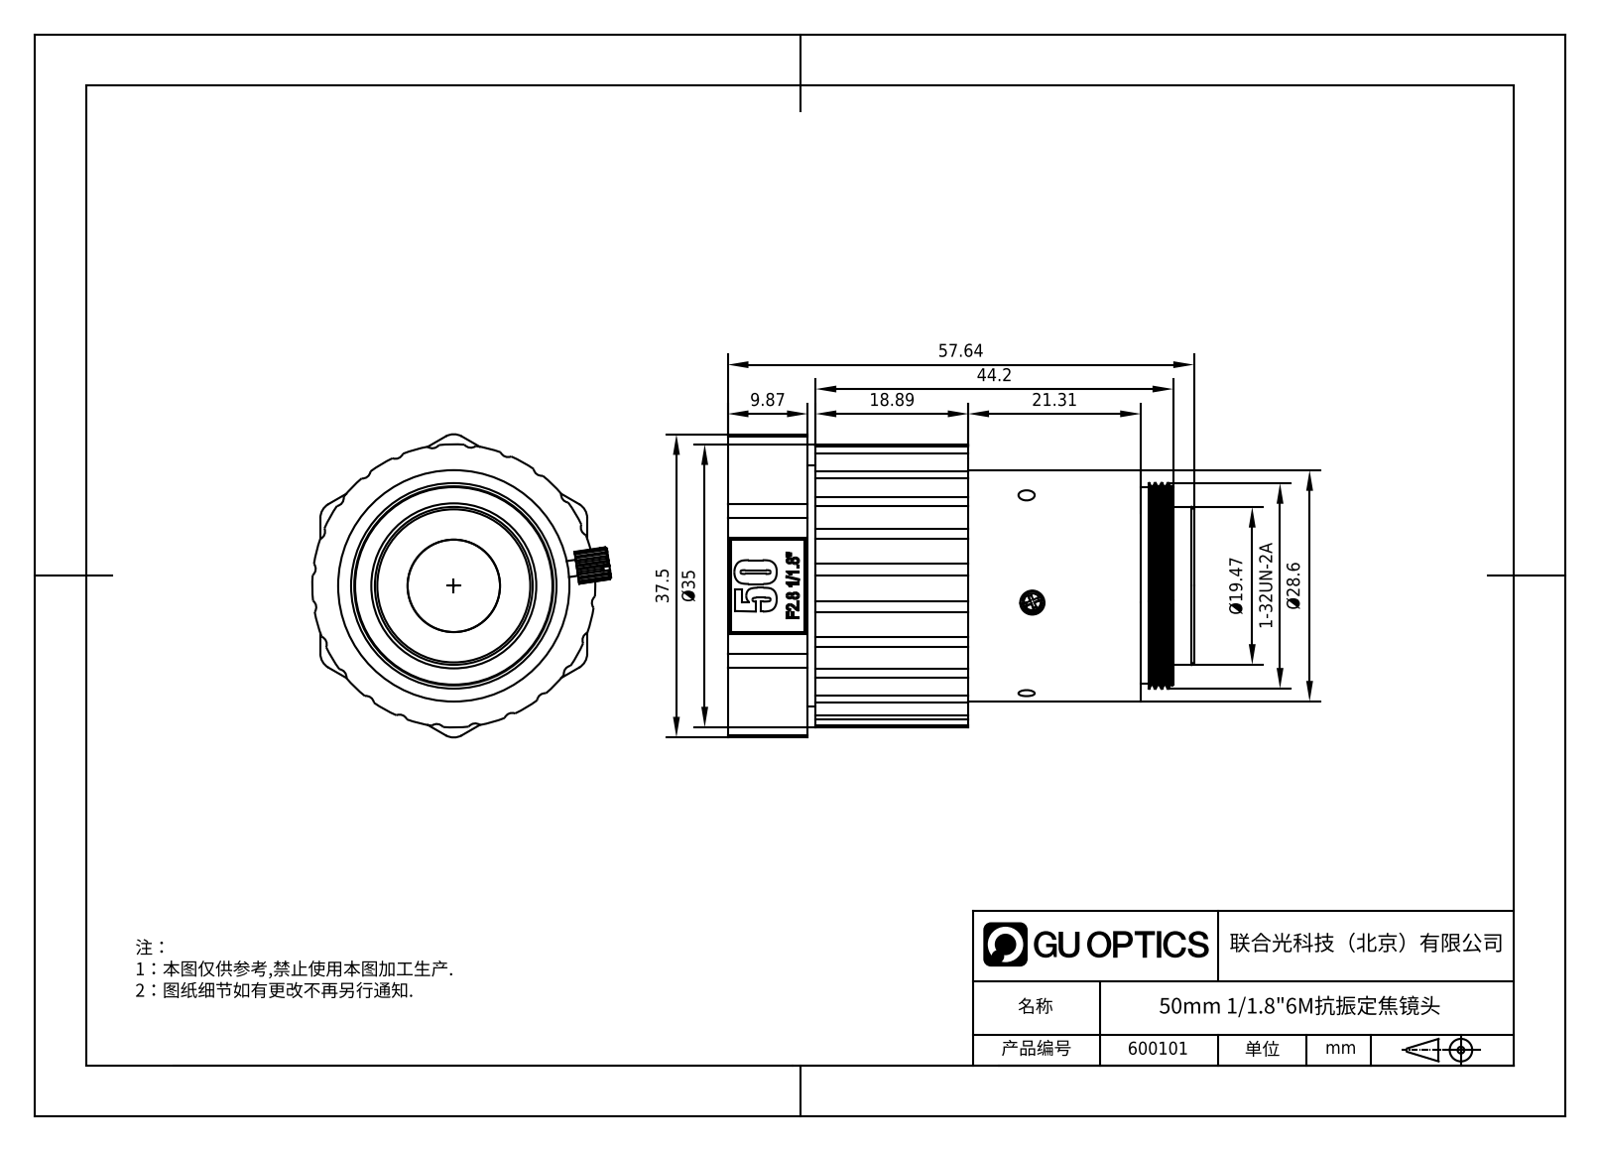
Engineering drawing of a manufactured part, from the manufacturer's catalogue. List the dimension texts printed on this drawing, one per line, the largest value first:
57.64
44.2
37.5
Ø35
Ø28.6
21.31
Ø19.47
18.89
9.87
1-32UN-2A
